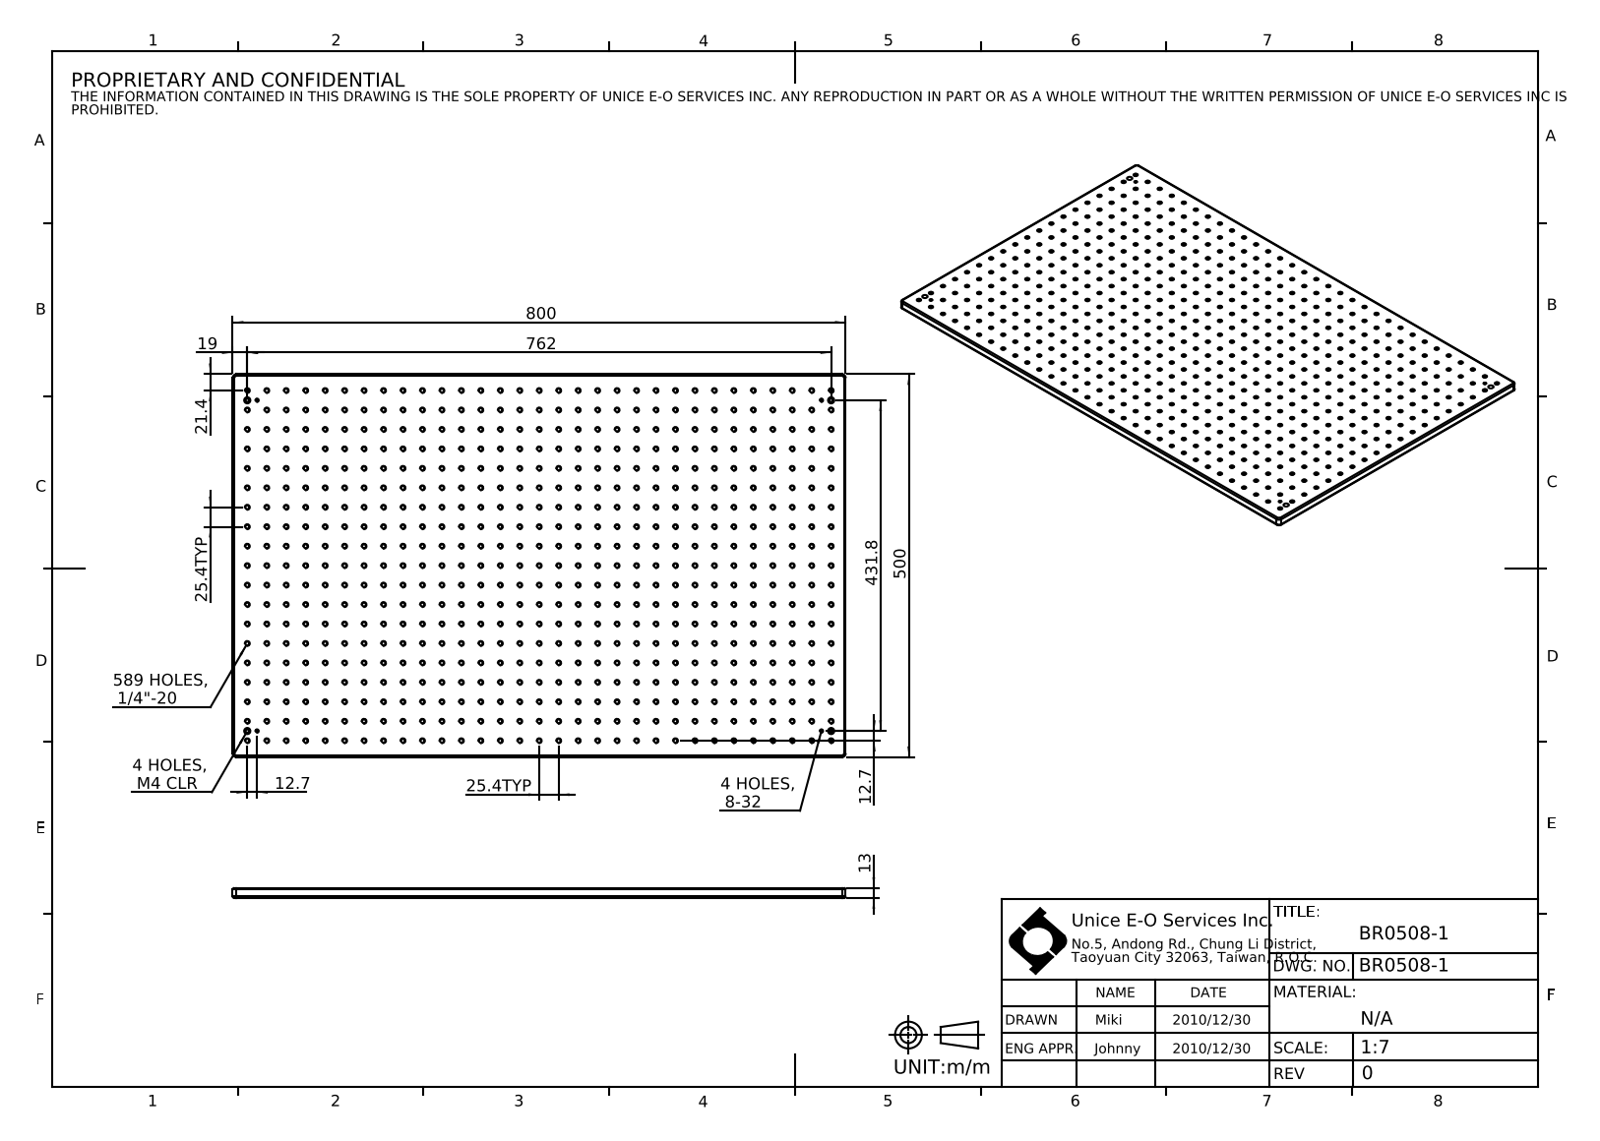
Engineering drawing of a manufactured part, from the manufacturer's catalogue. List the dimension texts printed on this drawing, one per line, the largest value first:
800
762
589 HOLES, 1/4"-20
500
431.8
25.4 TYP
25.4 TYP
21.4
19
13
12.7
12.7
4 HOLES, 8-32
4 HOLES, M4 CLR
